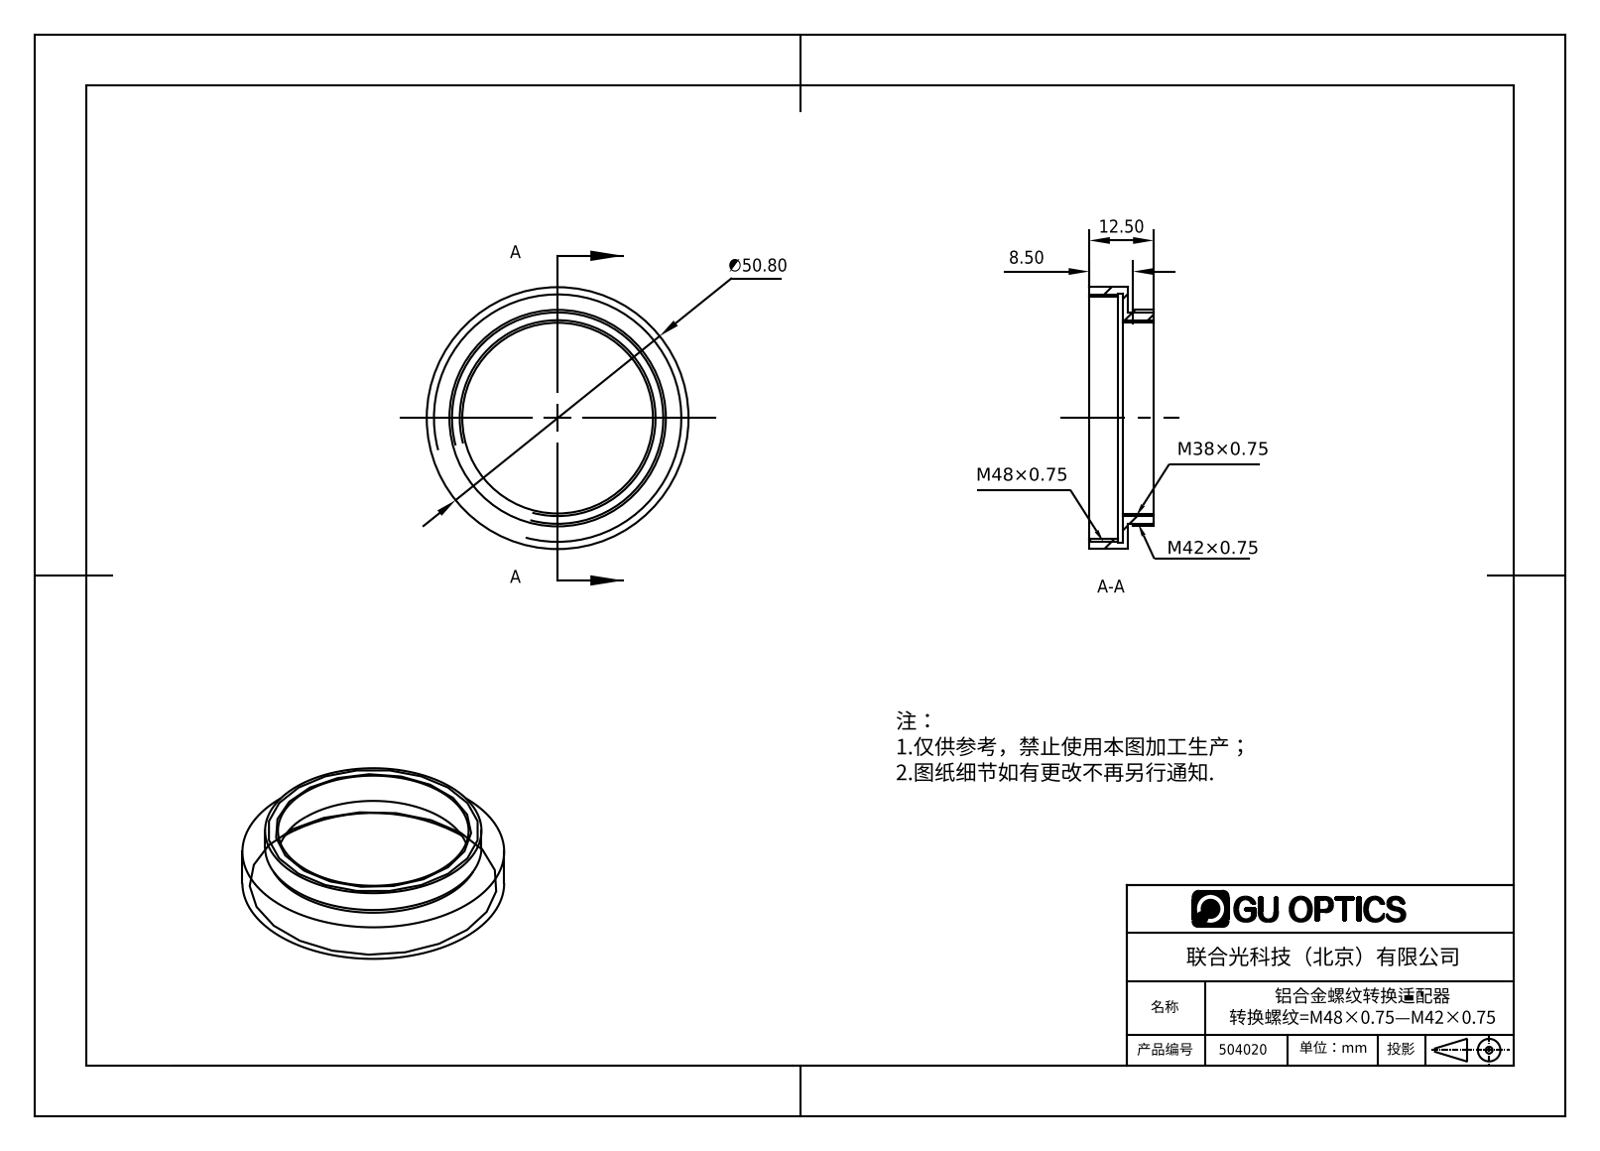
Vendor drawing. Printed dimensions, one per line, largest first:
∅50.80
12.50
8.50
